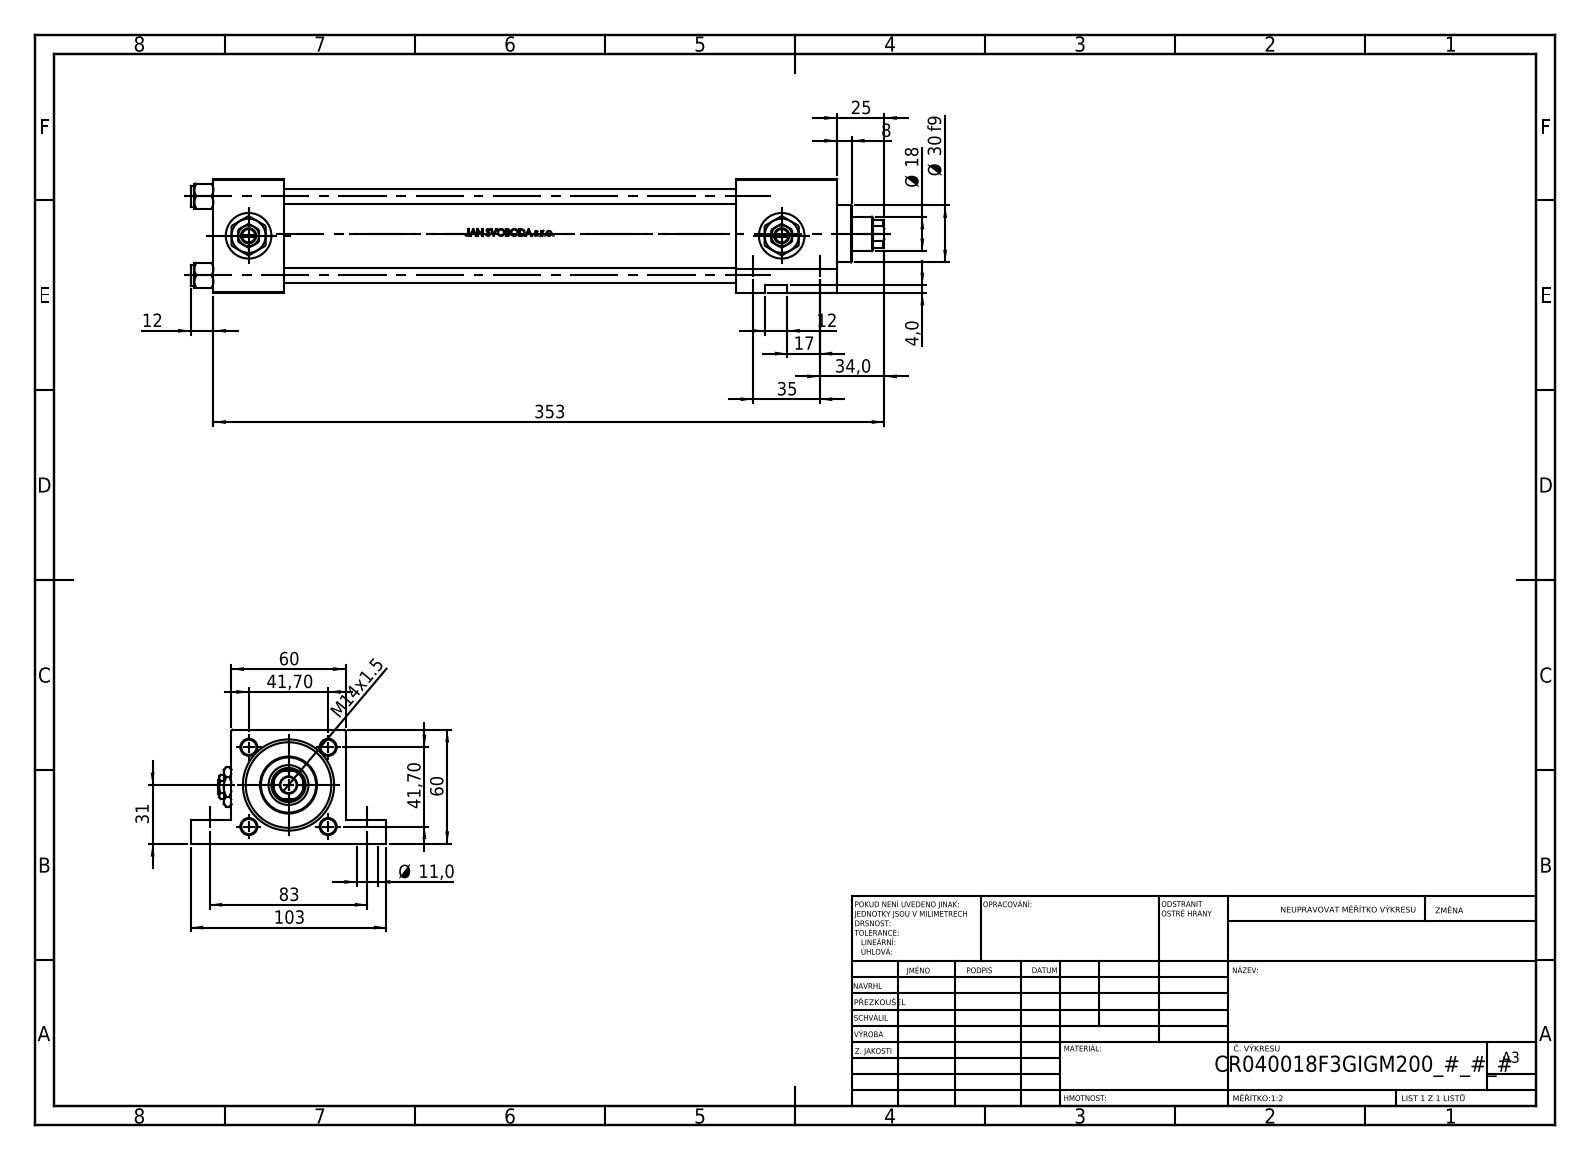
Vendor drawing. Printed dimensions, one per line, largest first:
353
103
83
60
60
41,70
41,70
35
34,0
31
Ø 30 f9
25
Ø 18
17
M14x1.5
12
12
Ø 11,0
8
4,0
